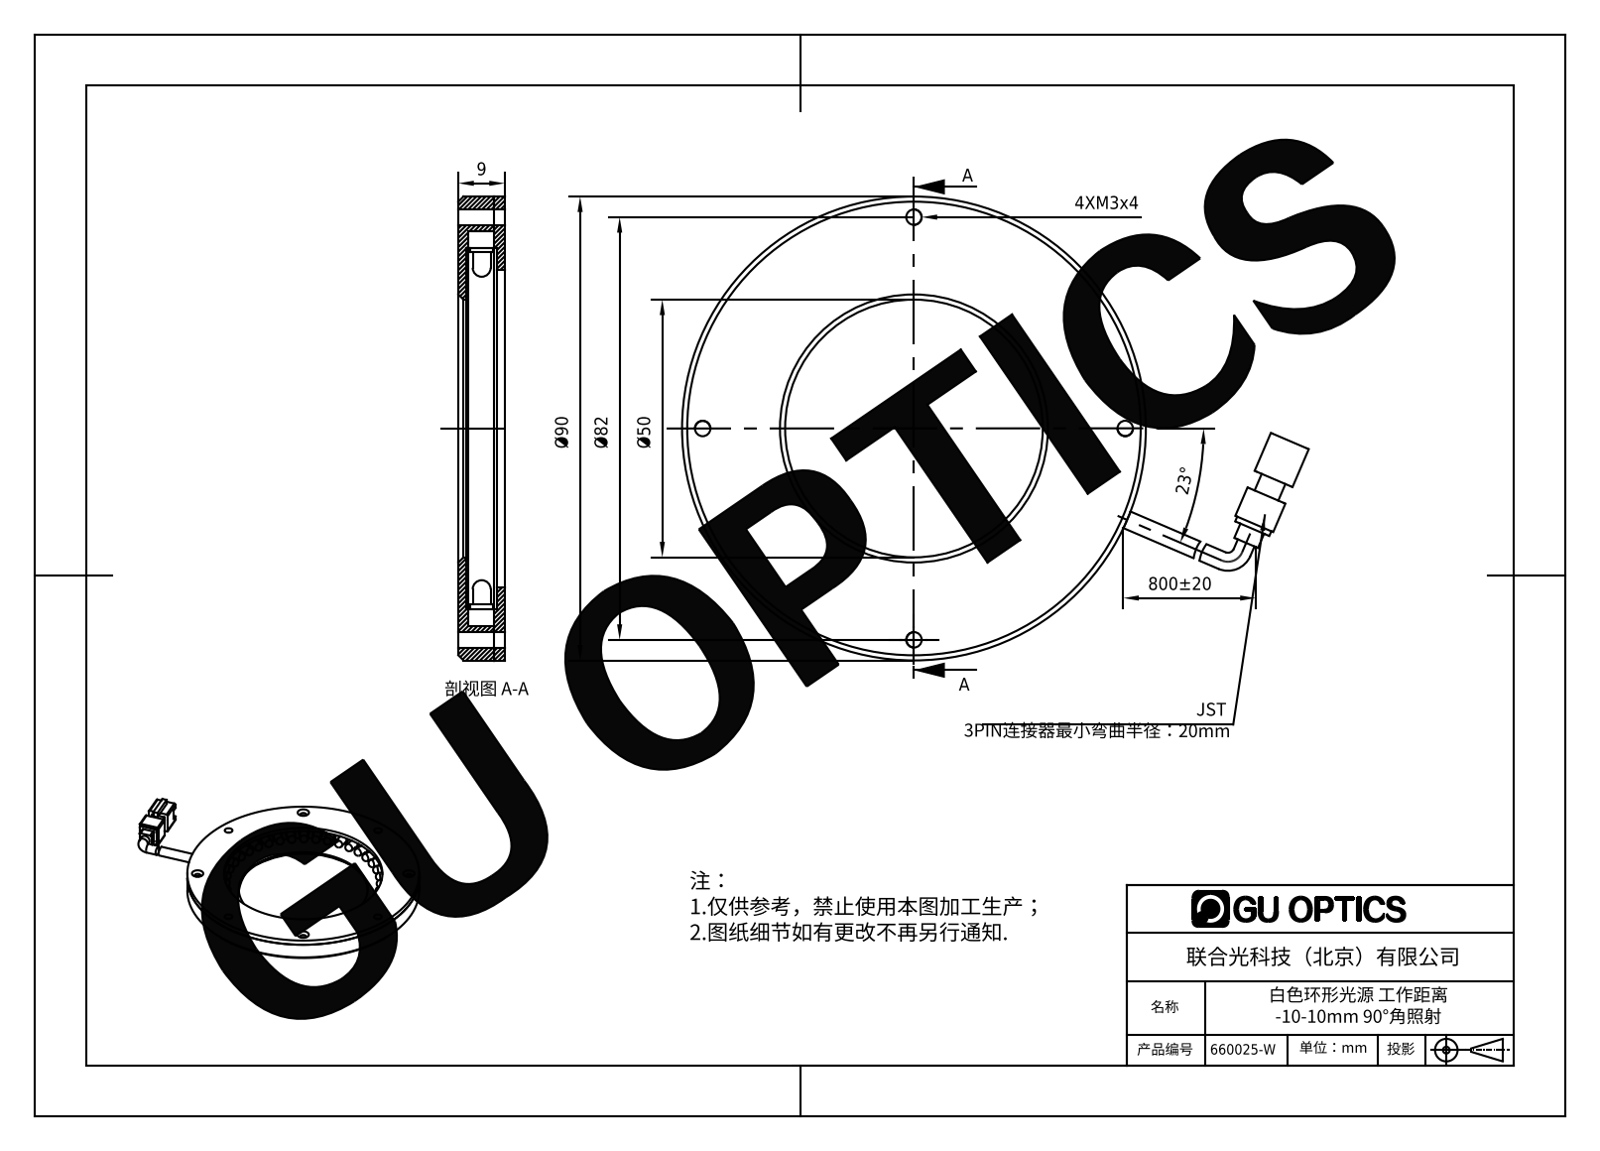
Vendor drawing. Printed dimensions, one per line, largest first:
800±20
Ø90
Ø82
Ø50
23°
9
4XM3x4
